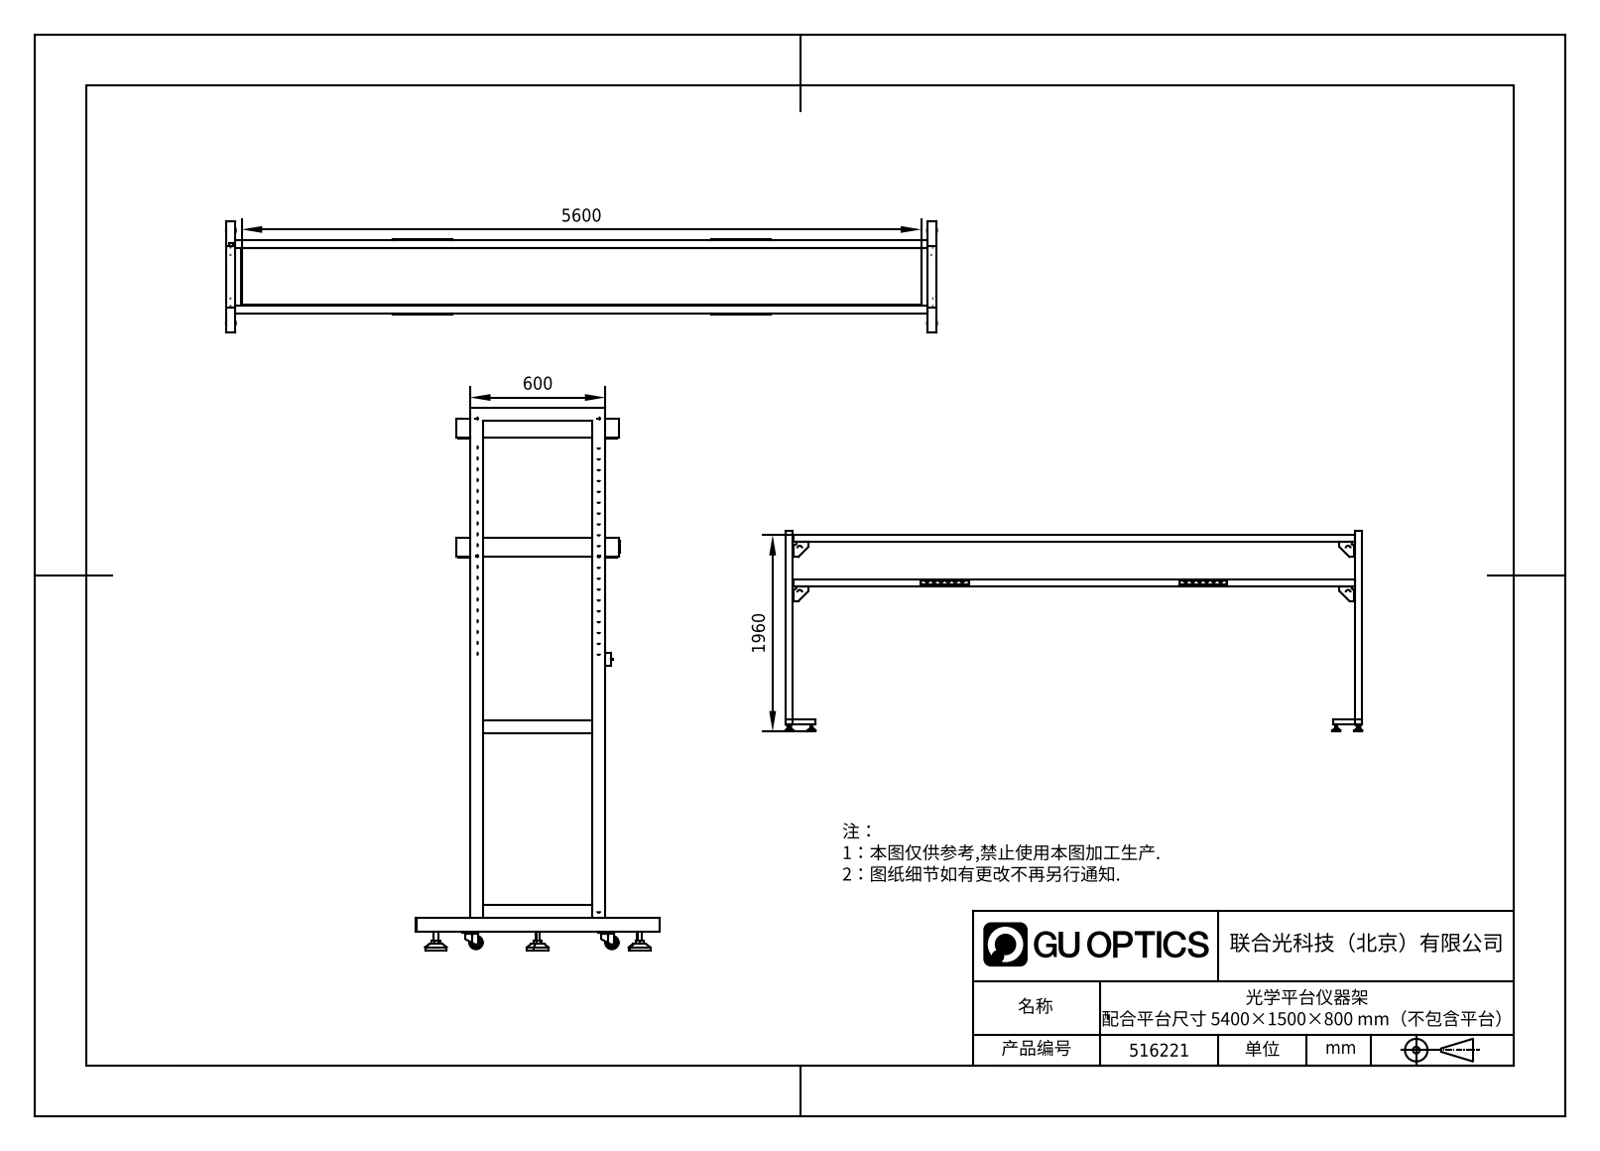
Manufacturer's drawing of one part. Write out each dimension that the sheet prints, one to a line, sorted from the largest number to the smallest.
5600
1960
600
